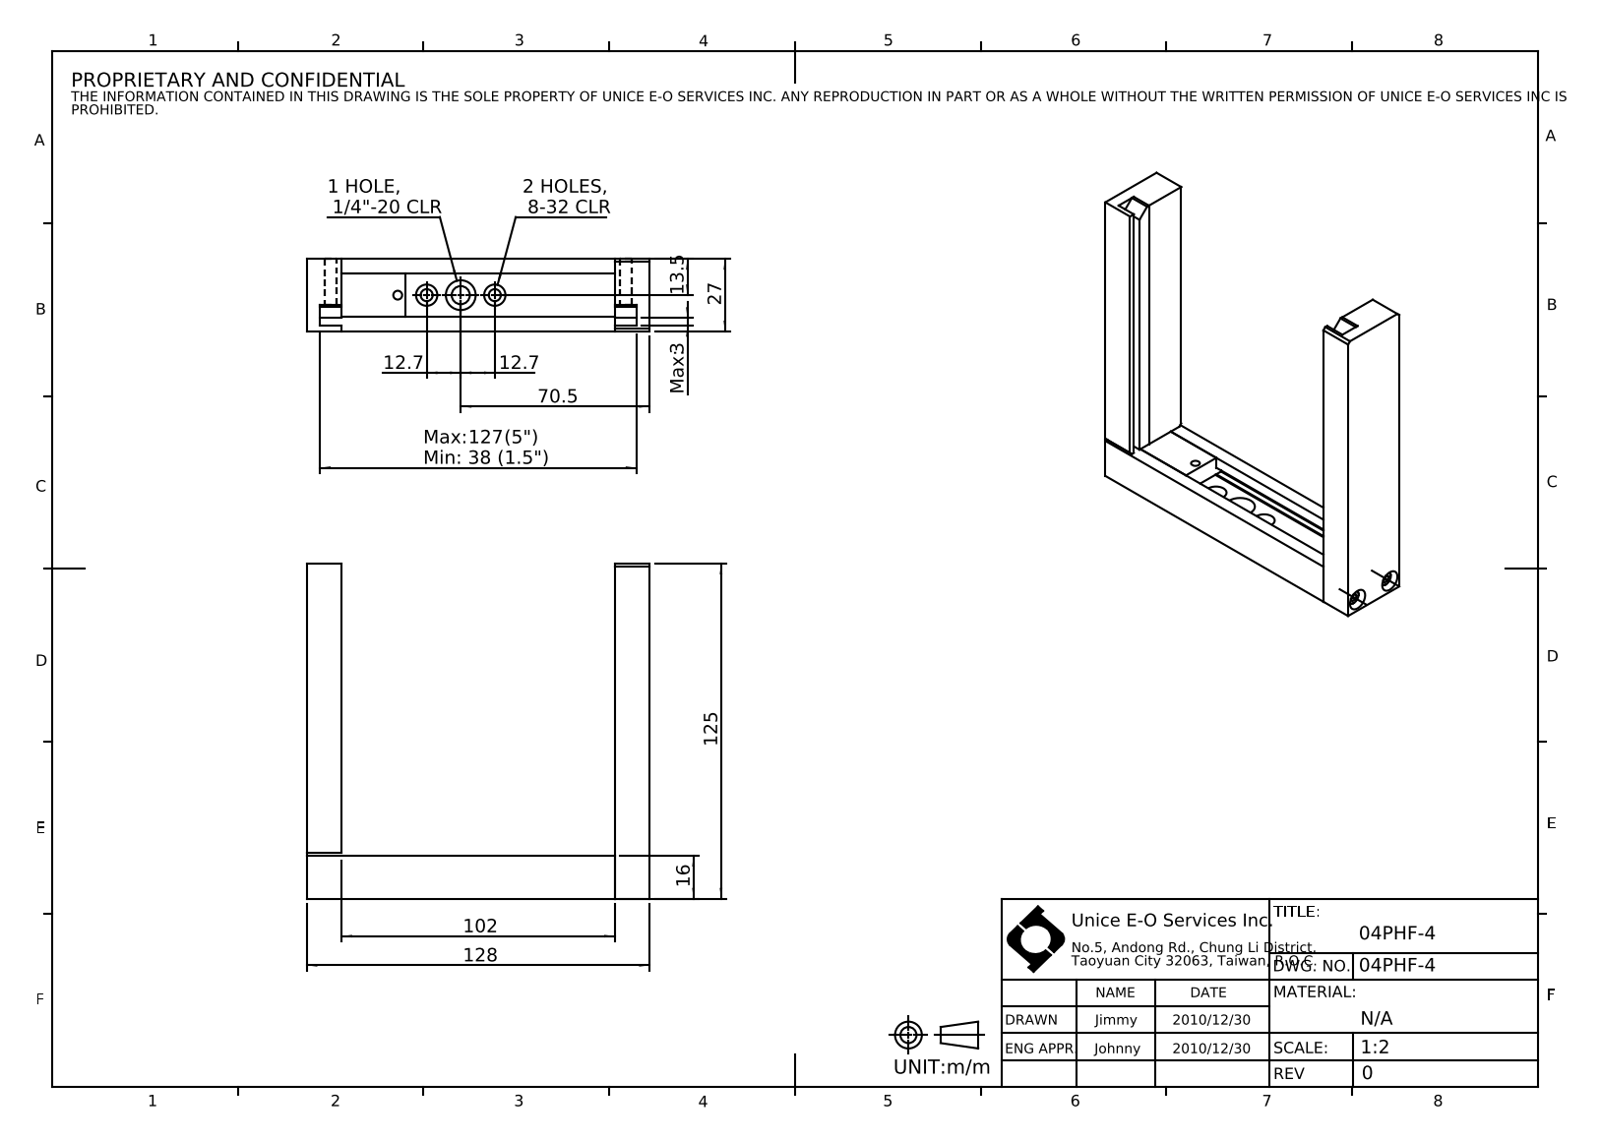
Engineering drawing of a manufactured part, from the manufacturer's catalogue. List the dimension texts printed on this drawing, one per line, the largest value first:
128
Max: 127 (5") Min: 38 (1.5")
125
102
70.5
27
16
13.5
12.7
12.7
Max: 3
2 HOLES, 8-32 CLR
1 HOLE, 1/4"-20 CLR
